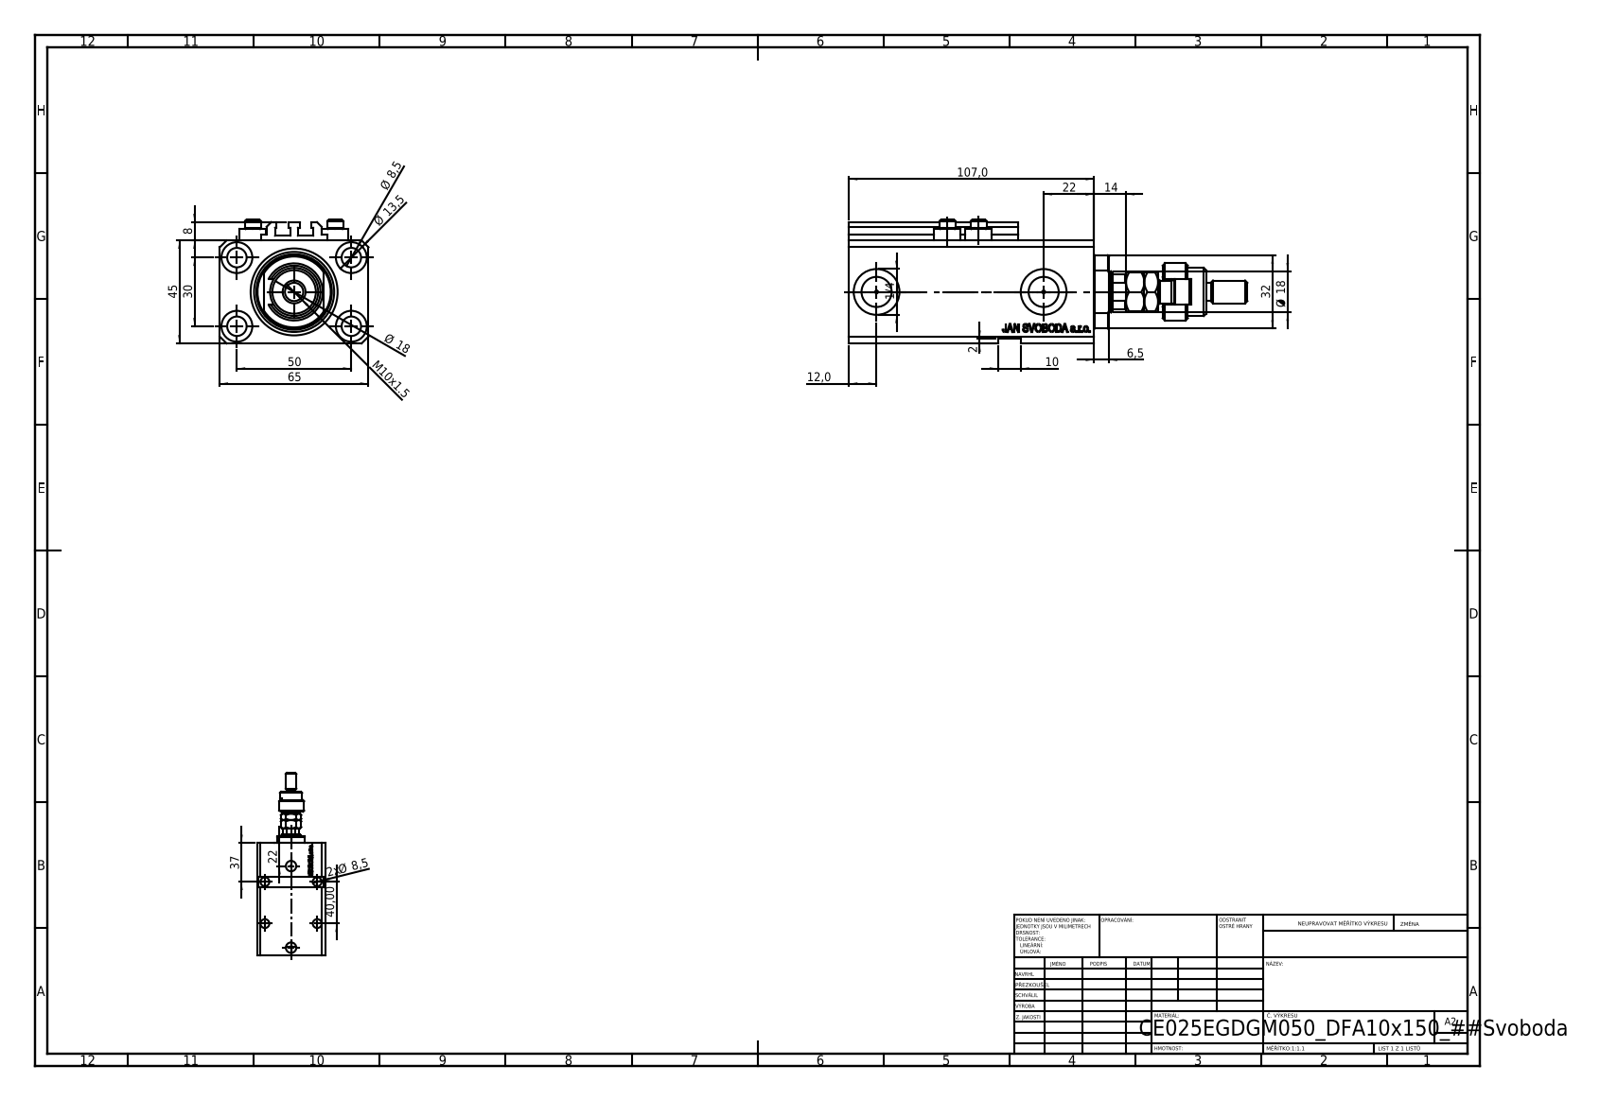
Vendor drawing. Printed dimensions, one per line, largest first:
107,0
65
50
45
40,00
37
32
30
22
22
Ø 18
Ø 18
14
Ø 13,5
12,0
M10x1.5
10
Ø 8,5
2x Ø 8,5
8
6,5
2
1/4
